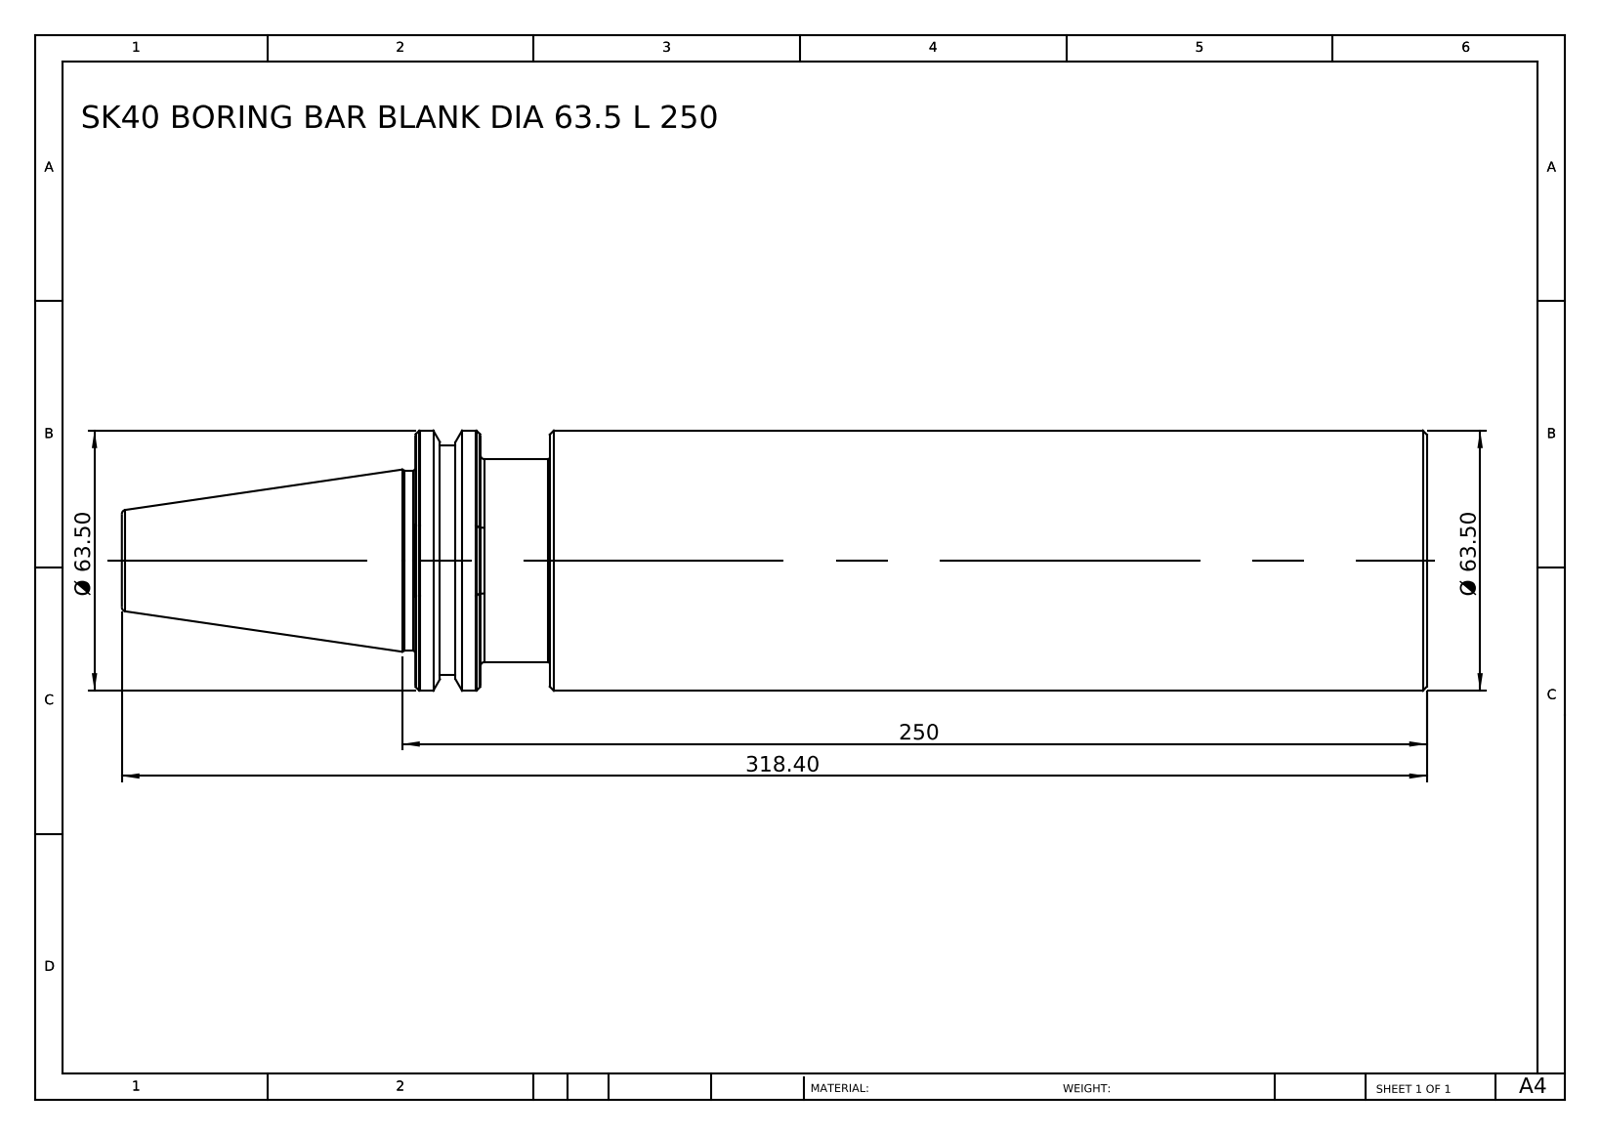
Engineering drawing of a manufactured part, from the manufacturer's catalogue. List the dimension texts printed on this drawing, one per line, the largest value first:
318.40
250
Ø 63.50
Ø 63.50
